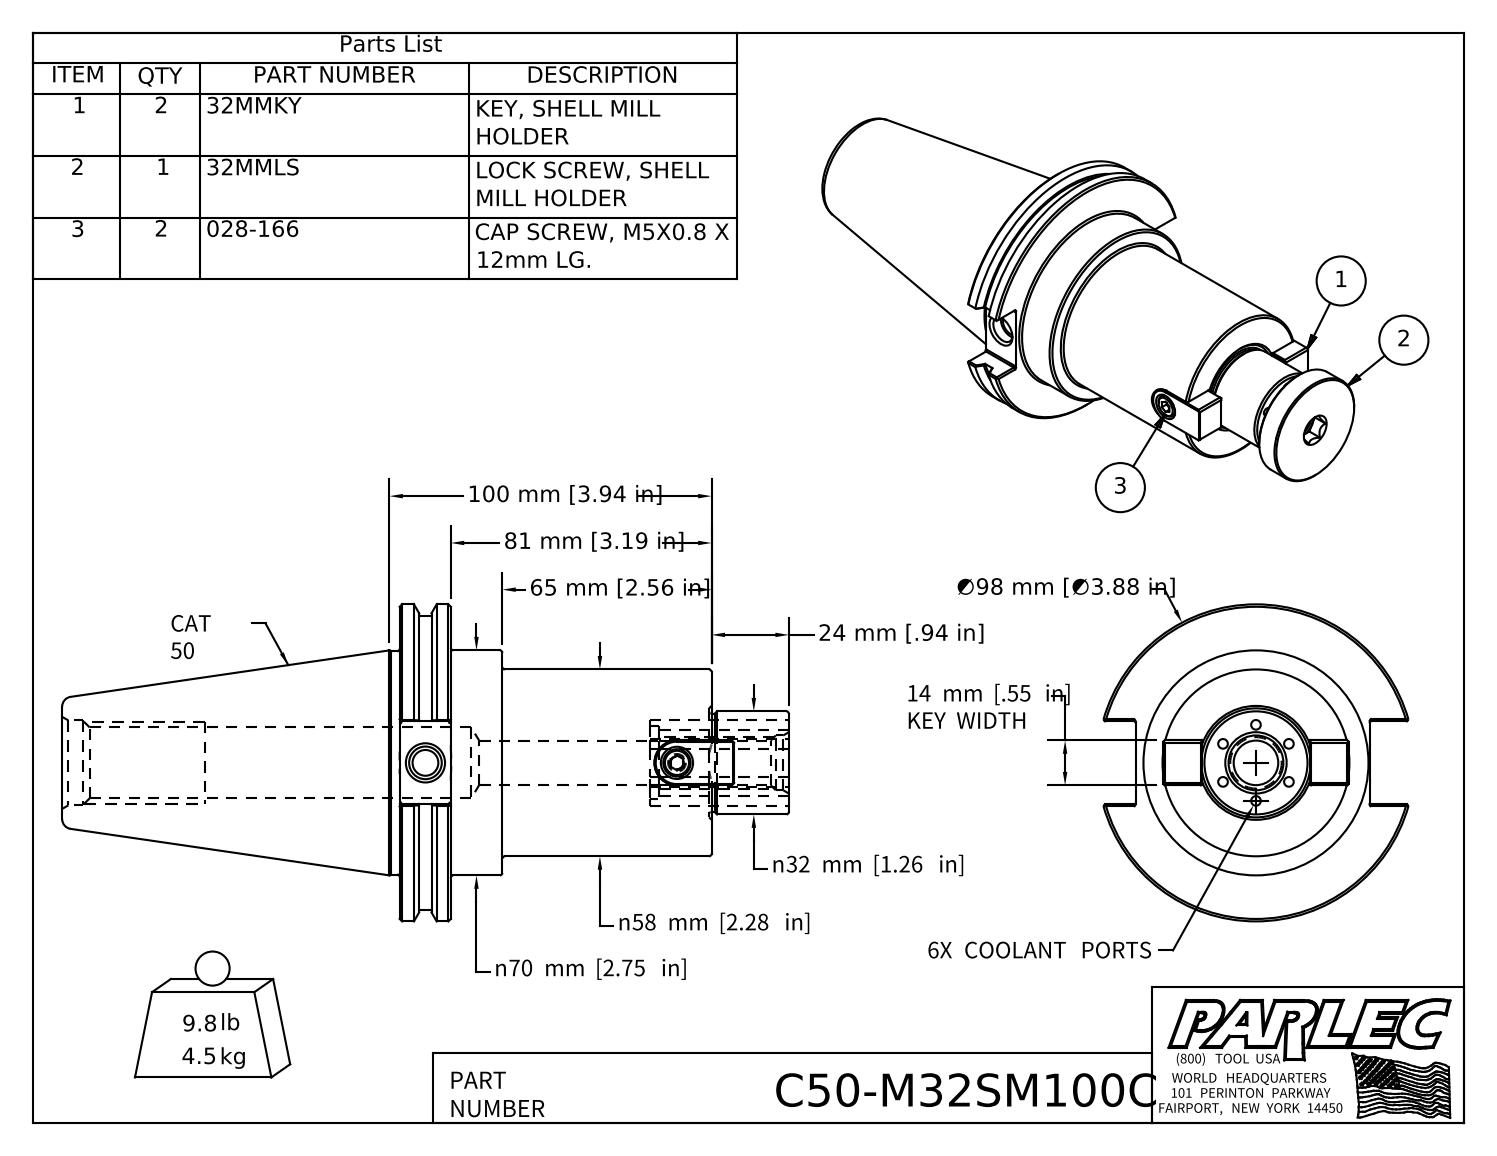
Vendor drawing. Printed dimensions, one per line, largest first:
100 mm [3.94 in]
∅98 mm [∅3.88 in]
81 mm [3.19 in]
n70 mm [2.75 in]
65 mm [2.56 in]
n58 mm [2.28 in]
n32 mm [1.26 in]
24 mm [.94 in]
14 mm [.55 in] KEY WIDTH
6X COOLANT PORTS
